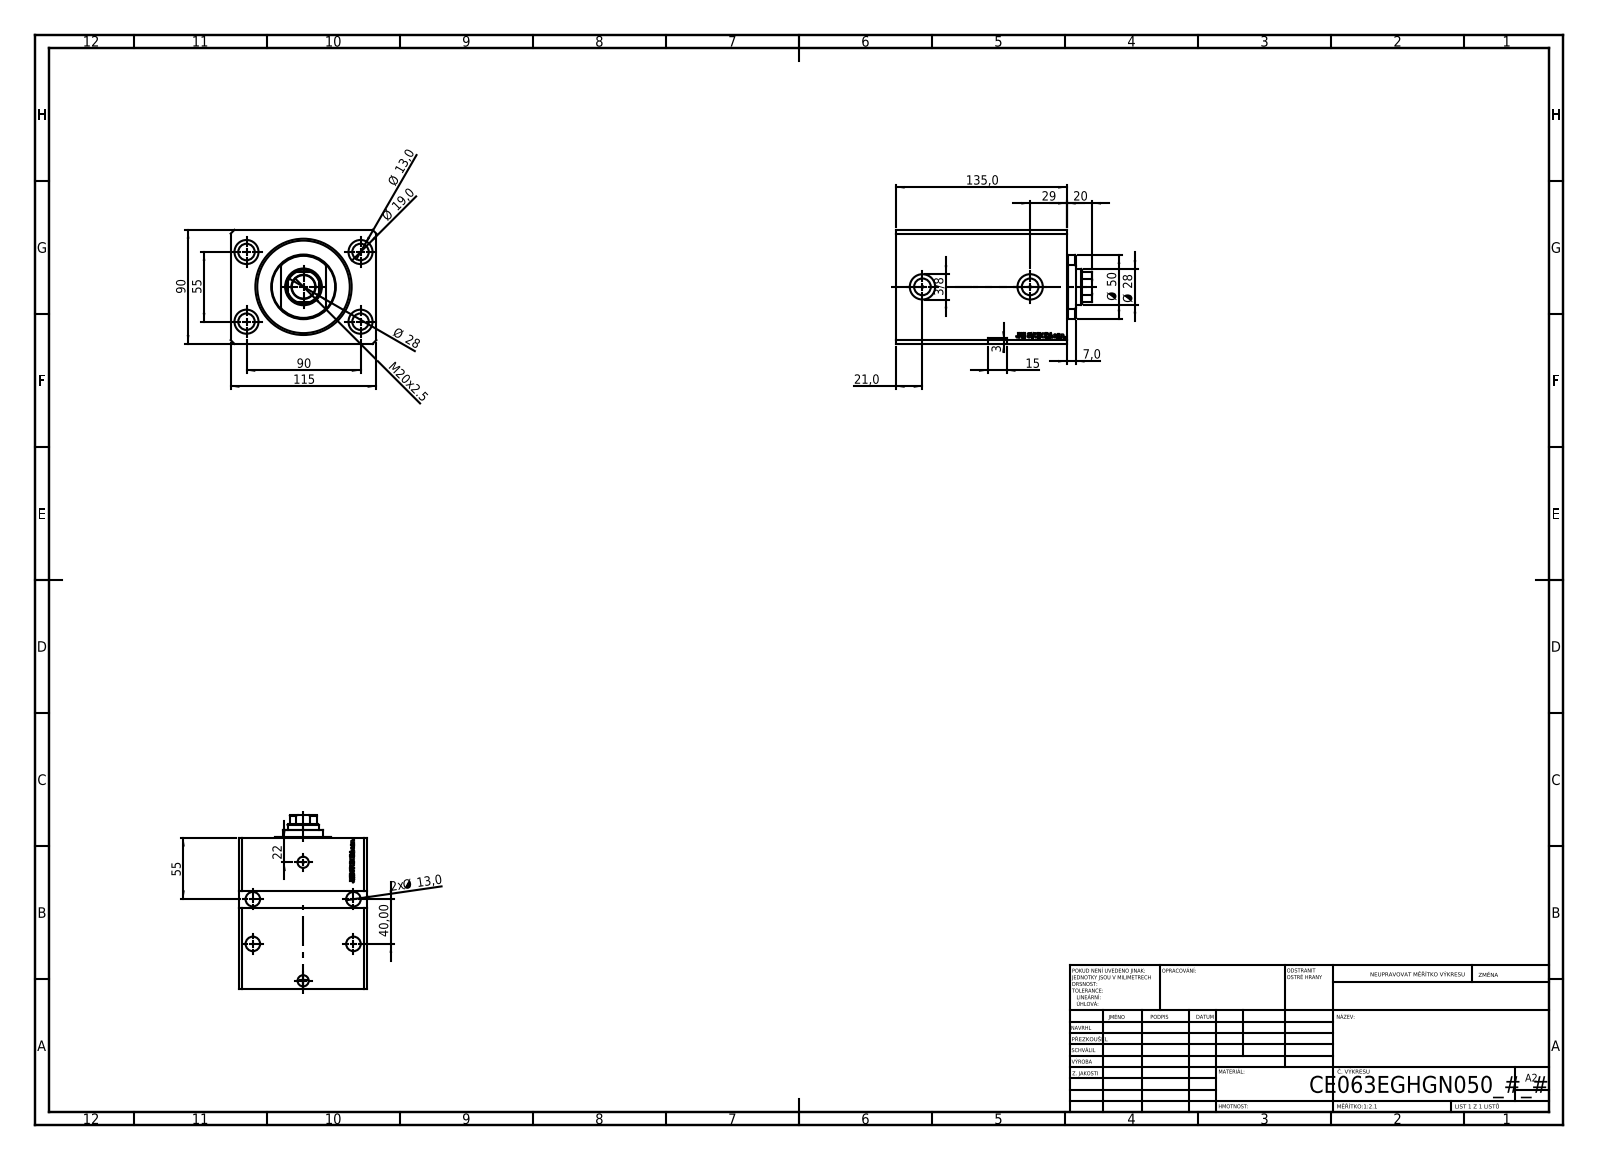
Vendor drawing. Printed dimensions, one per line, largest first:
135,0
115
90
90
55
55
Ø 50
40,00
29
Ø 28
Ø 28
22
21,0
M20x2.5
20
Ø 19,0
15
Ø 13,0
2x Ø 13,0
7,0
3
3/8
